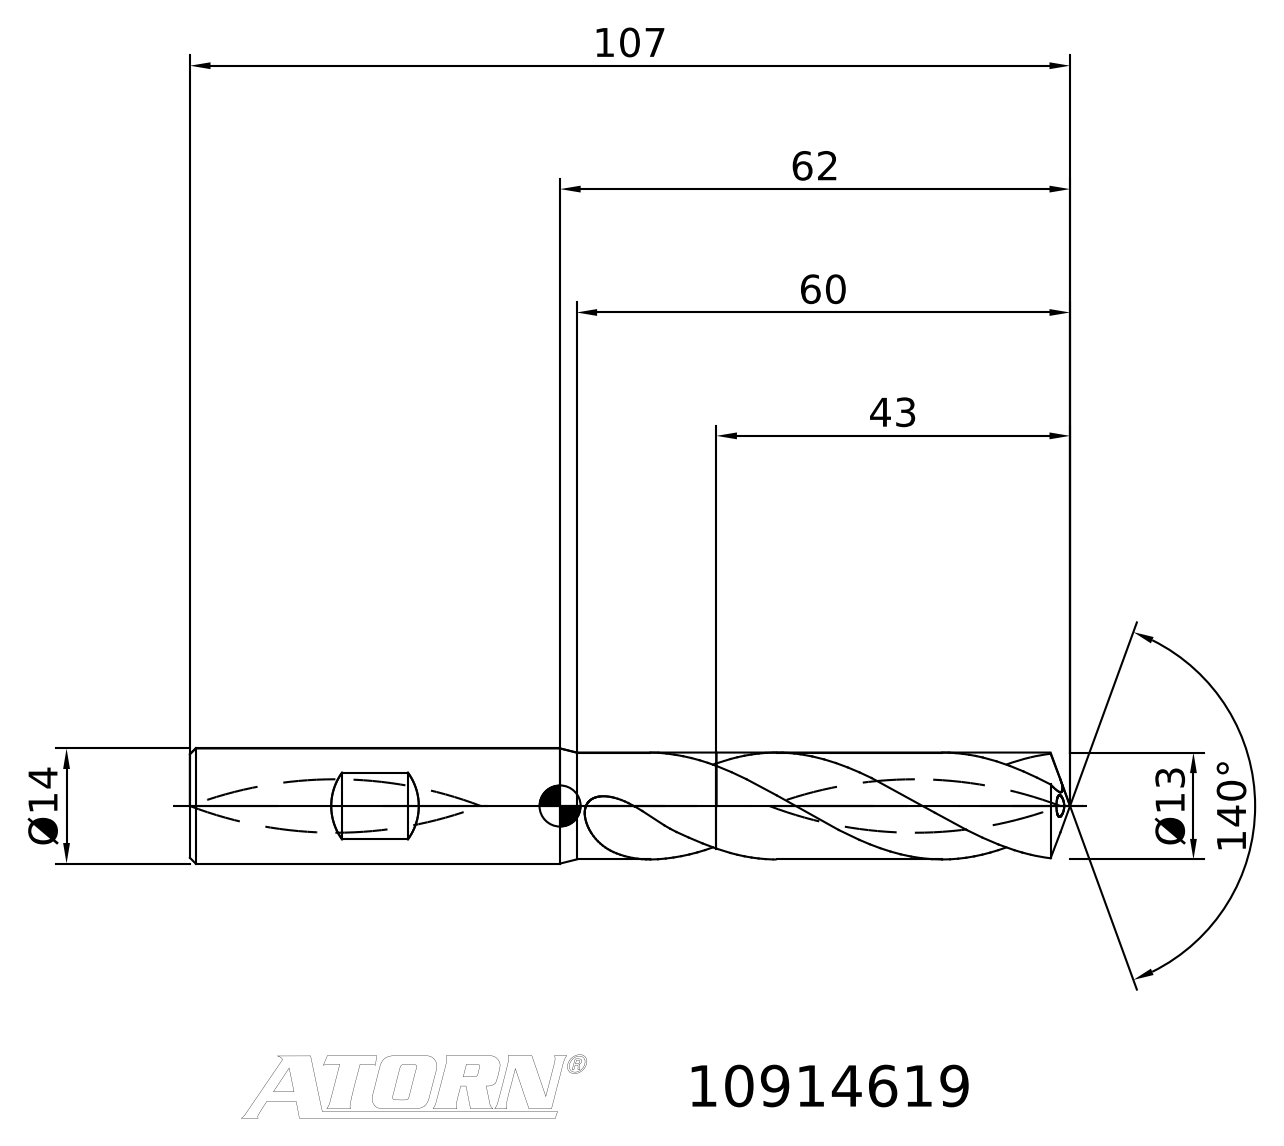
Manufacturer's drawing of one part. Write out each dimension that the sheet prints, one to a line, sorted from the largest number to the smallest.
140°
107
62
60
43
Ø14
Ø13
